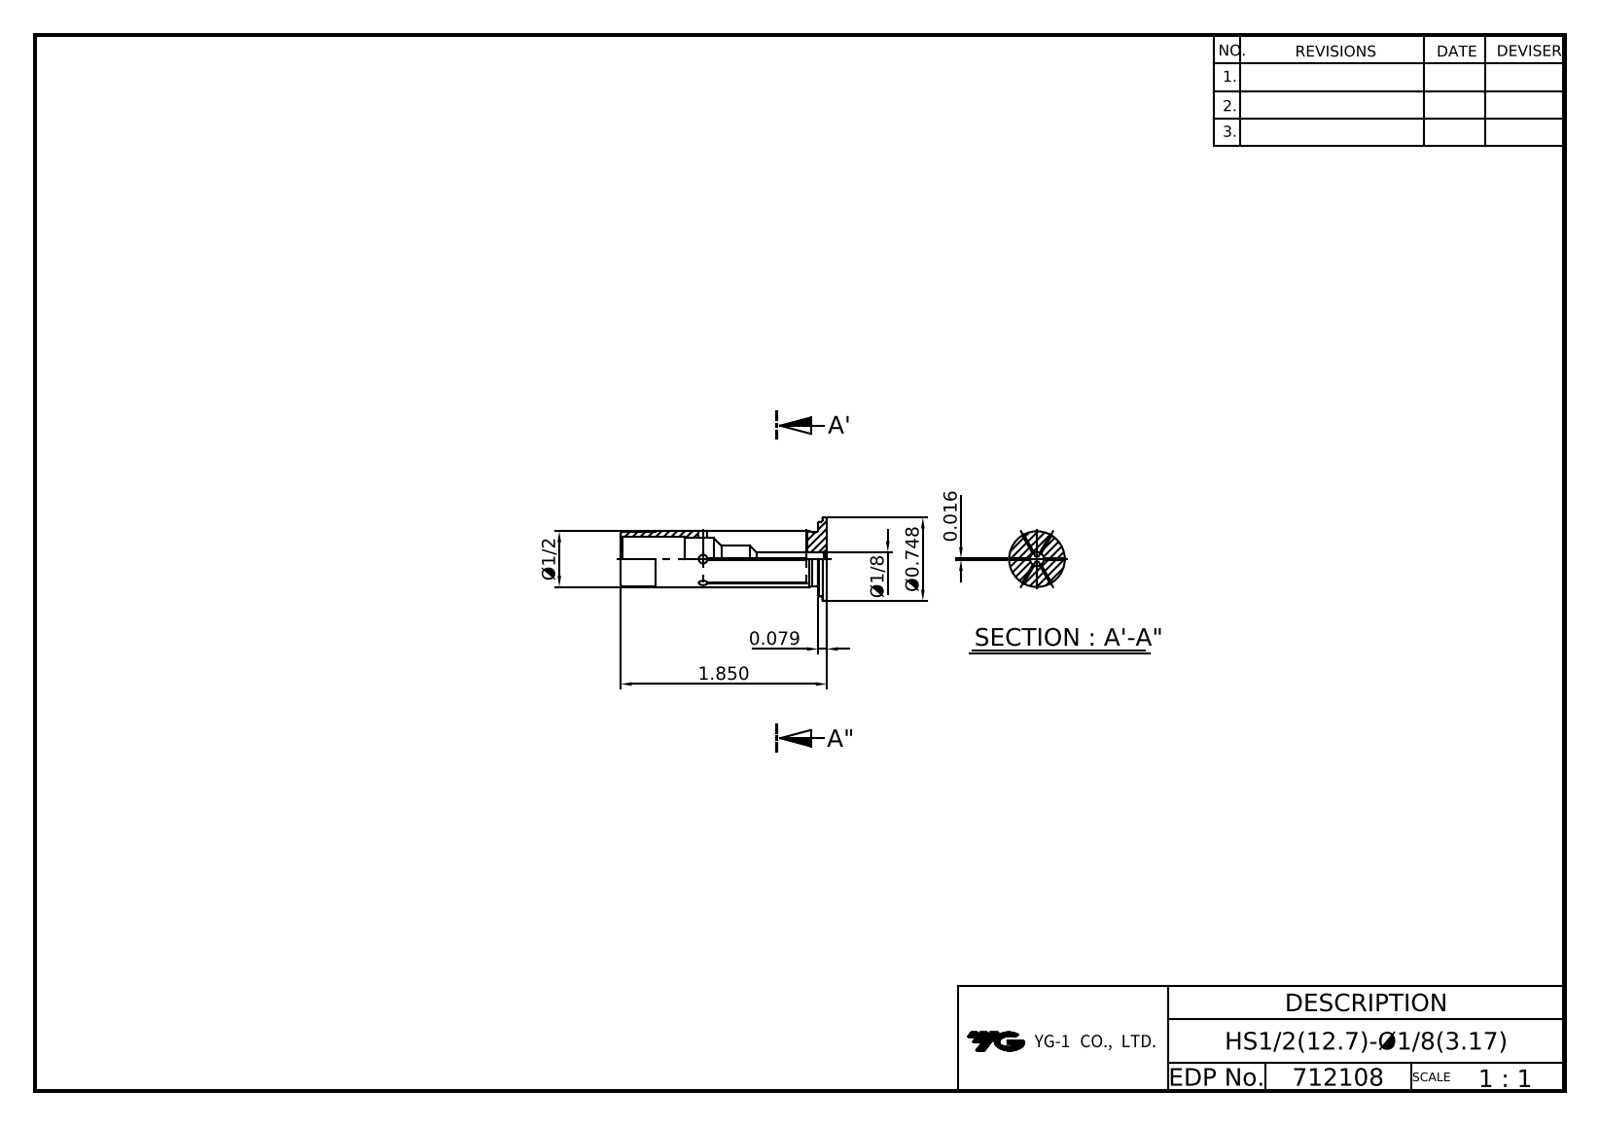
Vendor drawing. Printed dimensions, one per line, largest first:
1.850
Ø0.748
Ø1/2
0.079
0.016
